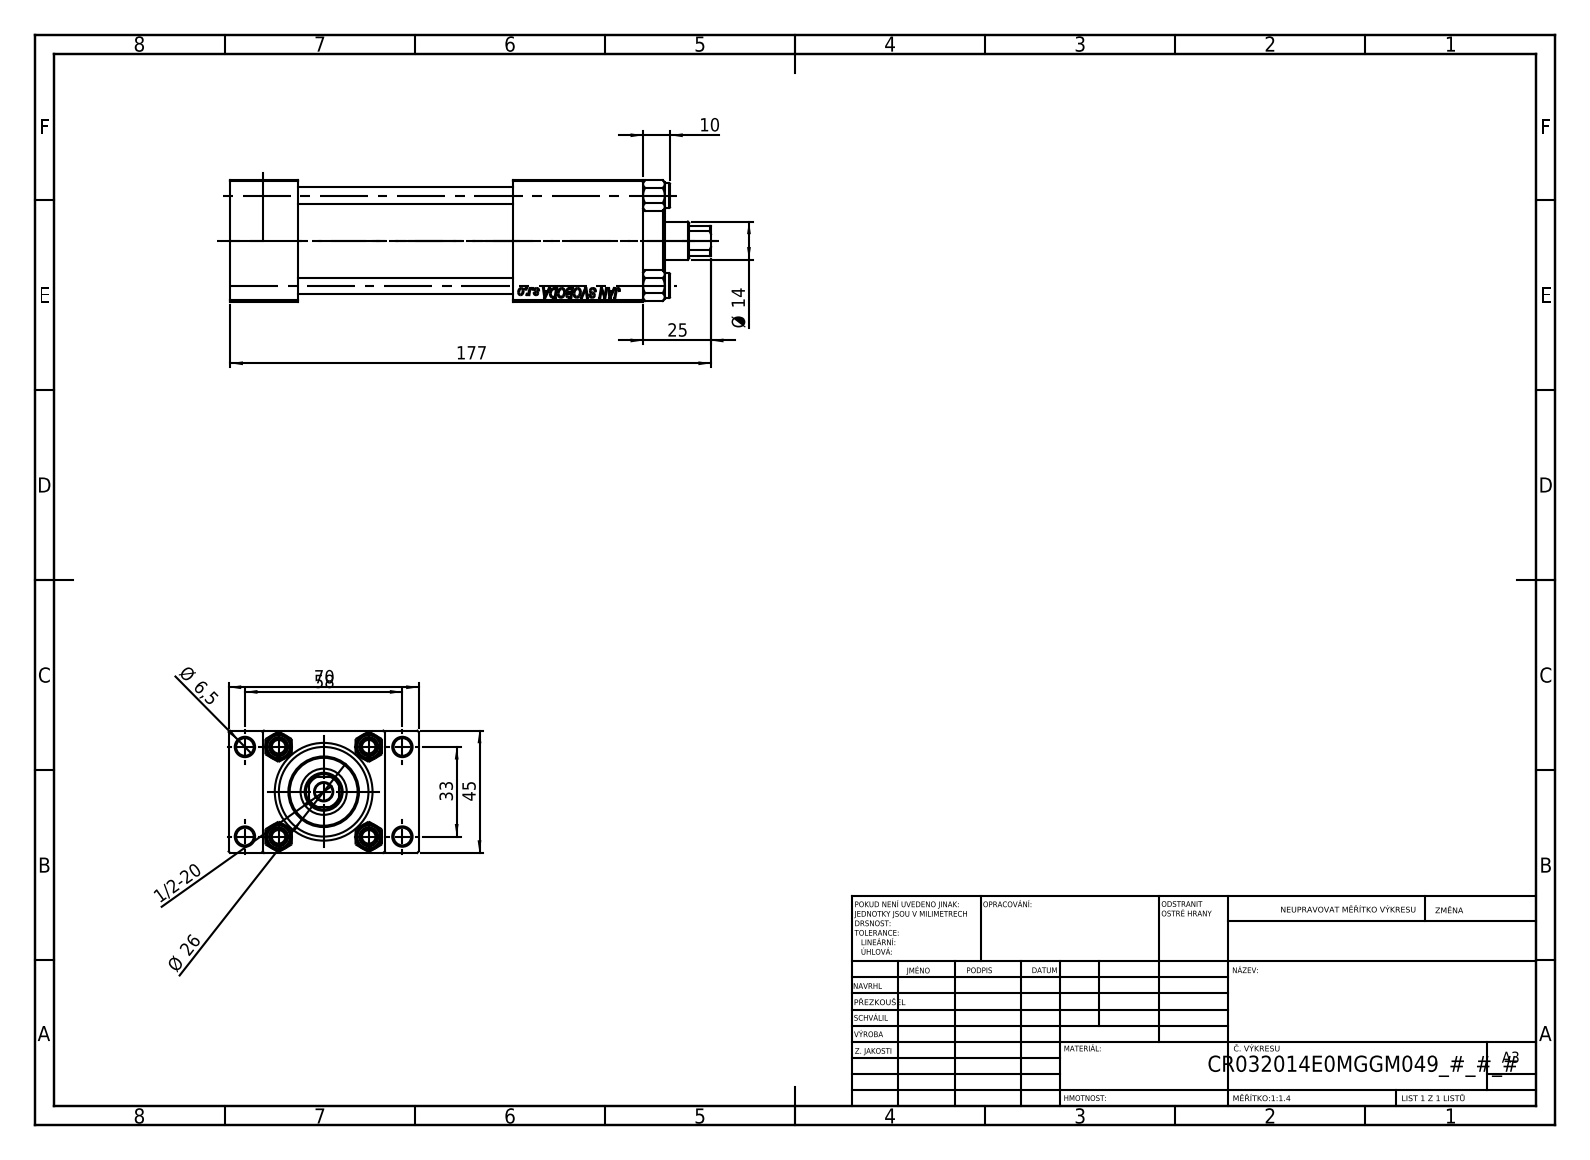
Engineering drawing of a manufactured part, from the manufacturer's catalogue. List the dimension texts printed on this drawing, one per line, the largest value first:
177
70
58
45
33
Ø 26
25
Ø 14
10
Ø 6,5
1/2-20
